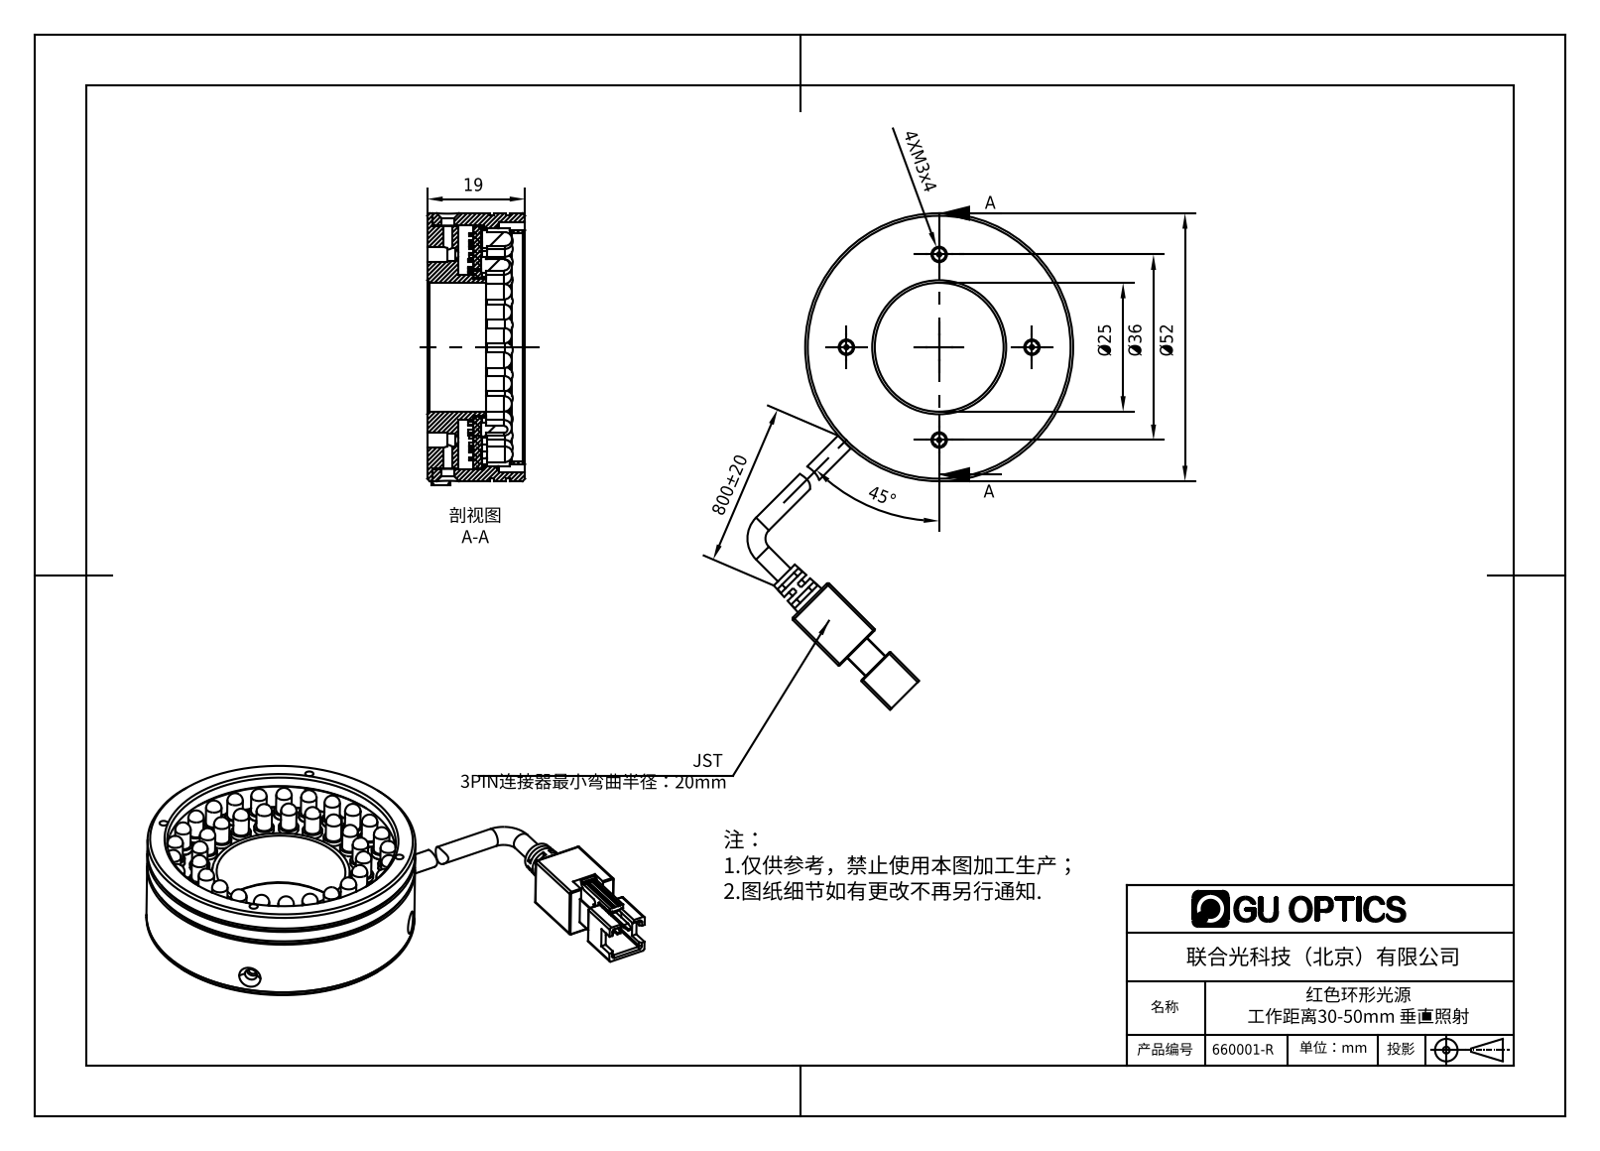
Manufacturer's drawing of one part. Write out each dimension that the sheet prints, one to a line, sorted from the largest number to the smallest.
800±20
Ø52
45°
Ø36
Ø25
19
4XM3x4
